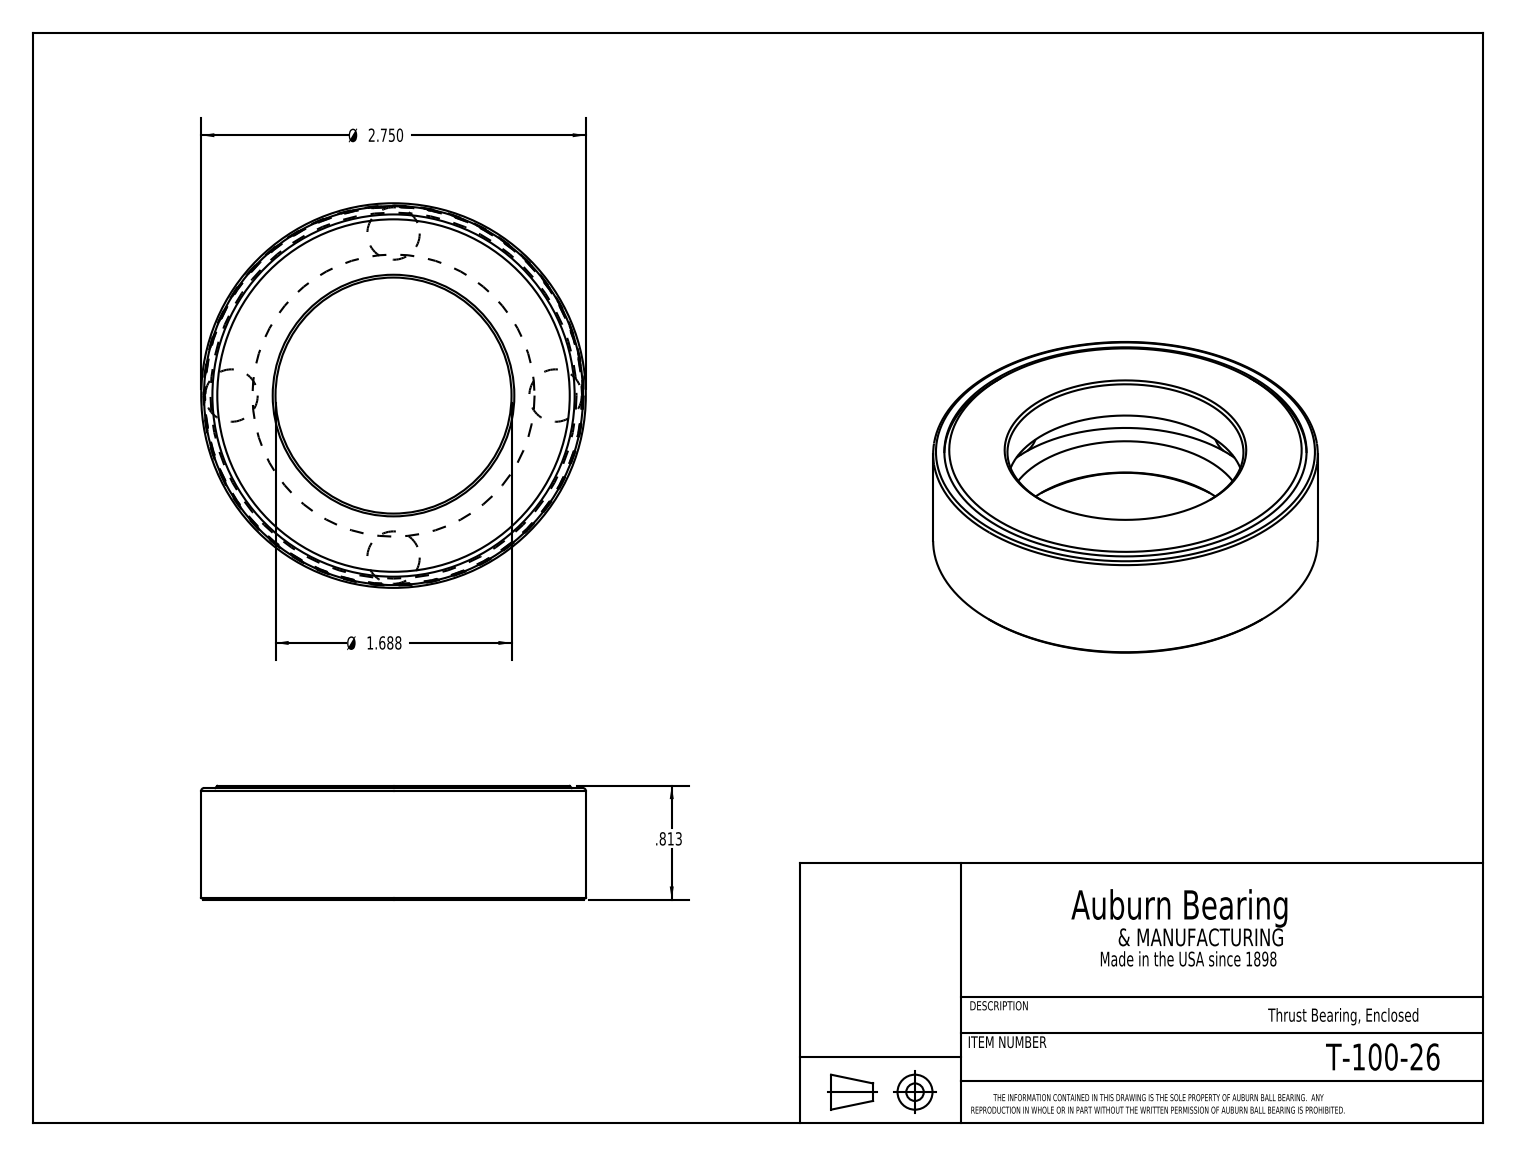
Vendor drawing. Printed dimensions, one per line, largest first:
Ø 2.750
Ø 1.688
.813
